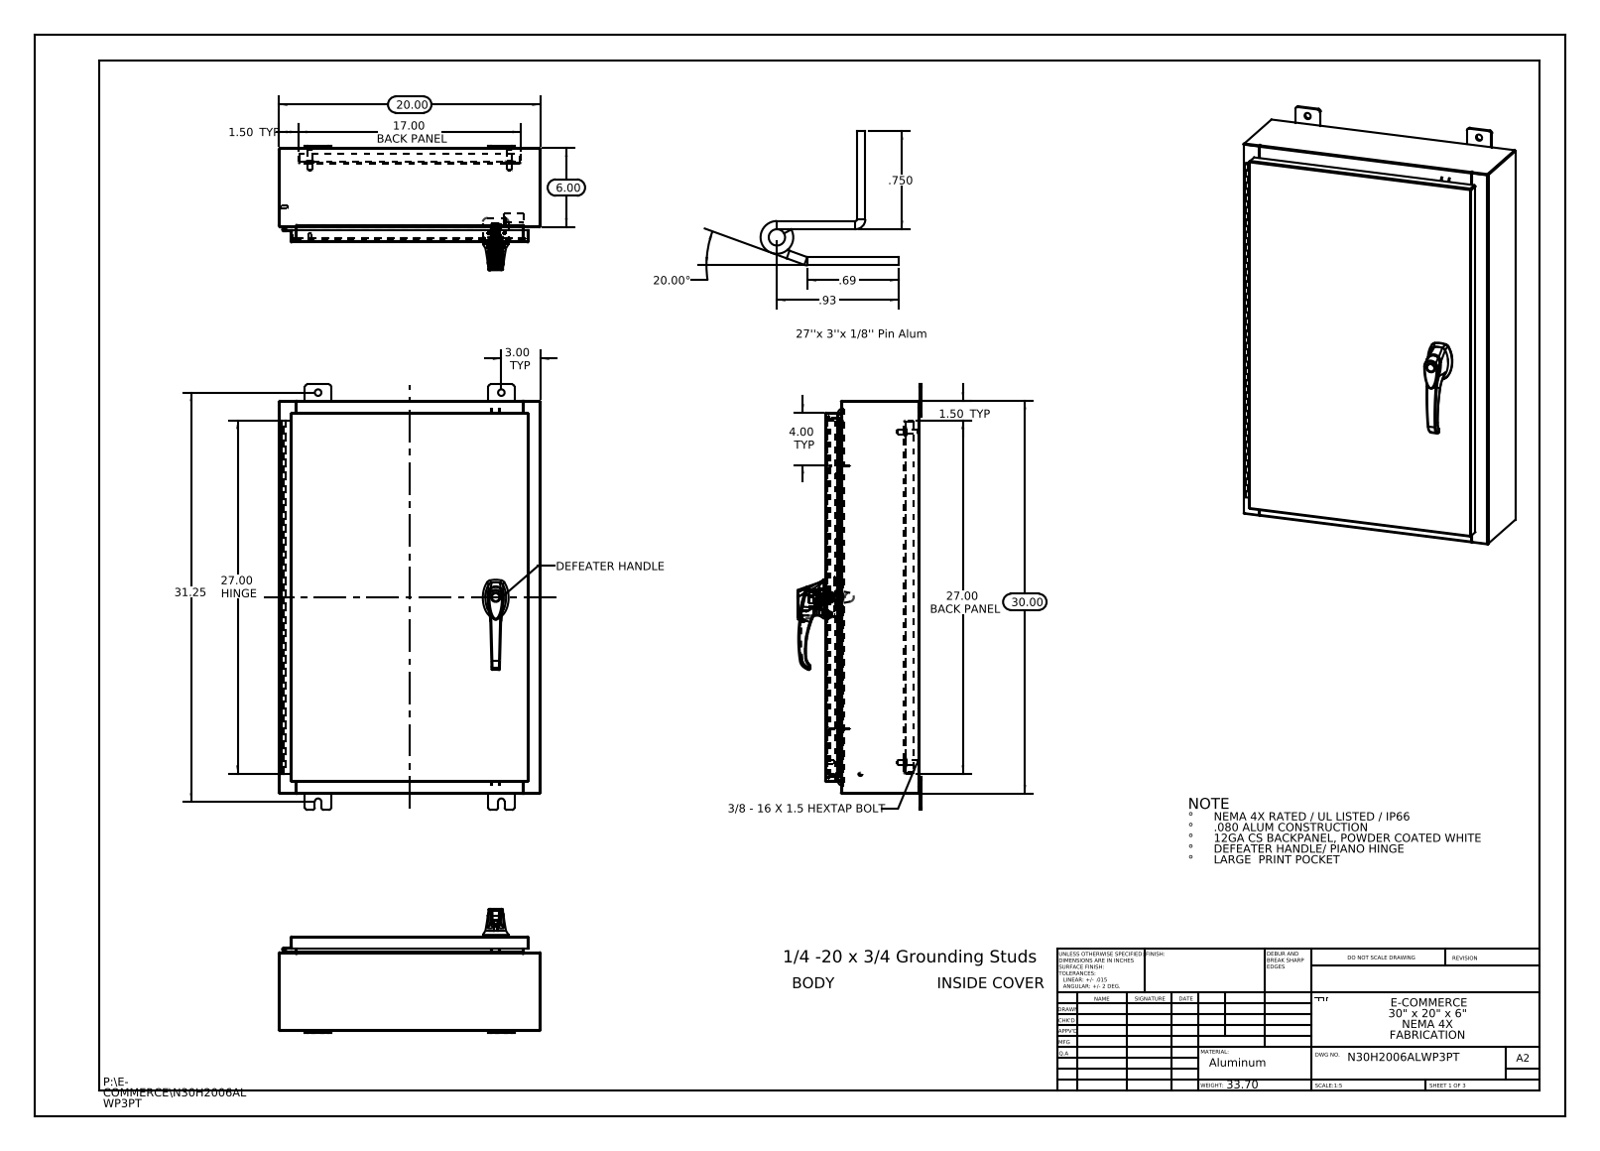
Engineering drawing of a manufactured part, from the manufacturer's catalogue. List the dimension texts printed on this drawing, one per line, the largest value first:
31.25
30.00
27.00 HINGE
27.00 BACK PANEL
20.00
20.00°
17.00 BACK PANEL
6.00
4.00 TYP
3.00 TYP
1.50 TYP
1.50 TYP
.93
.750
.69
